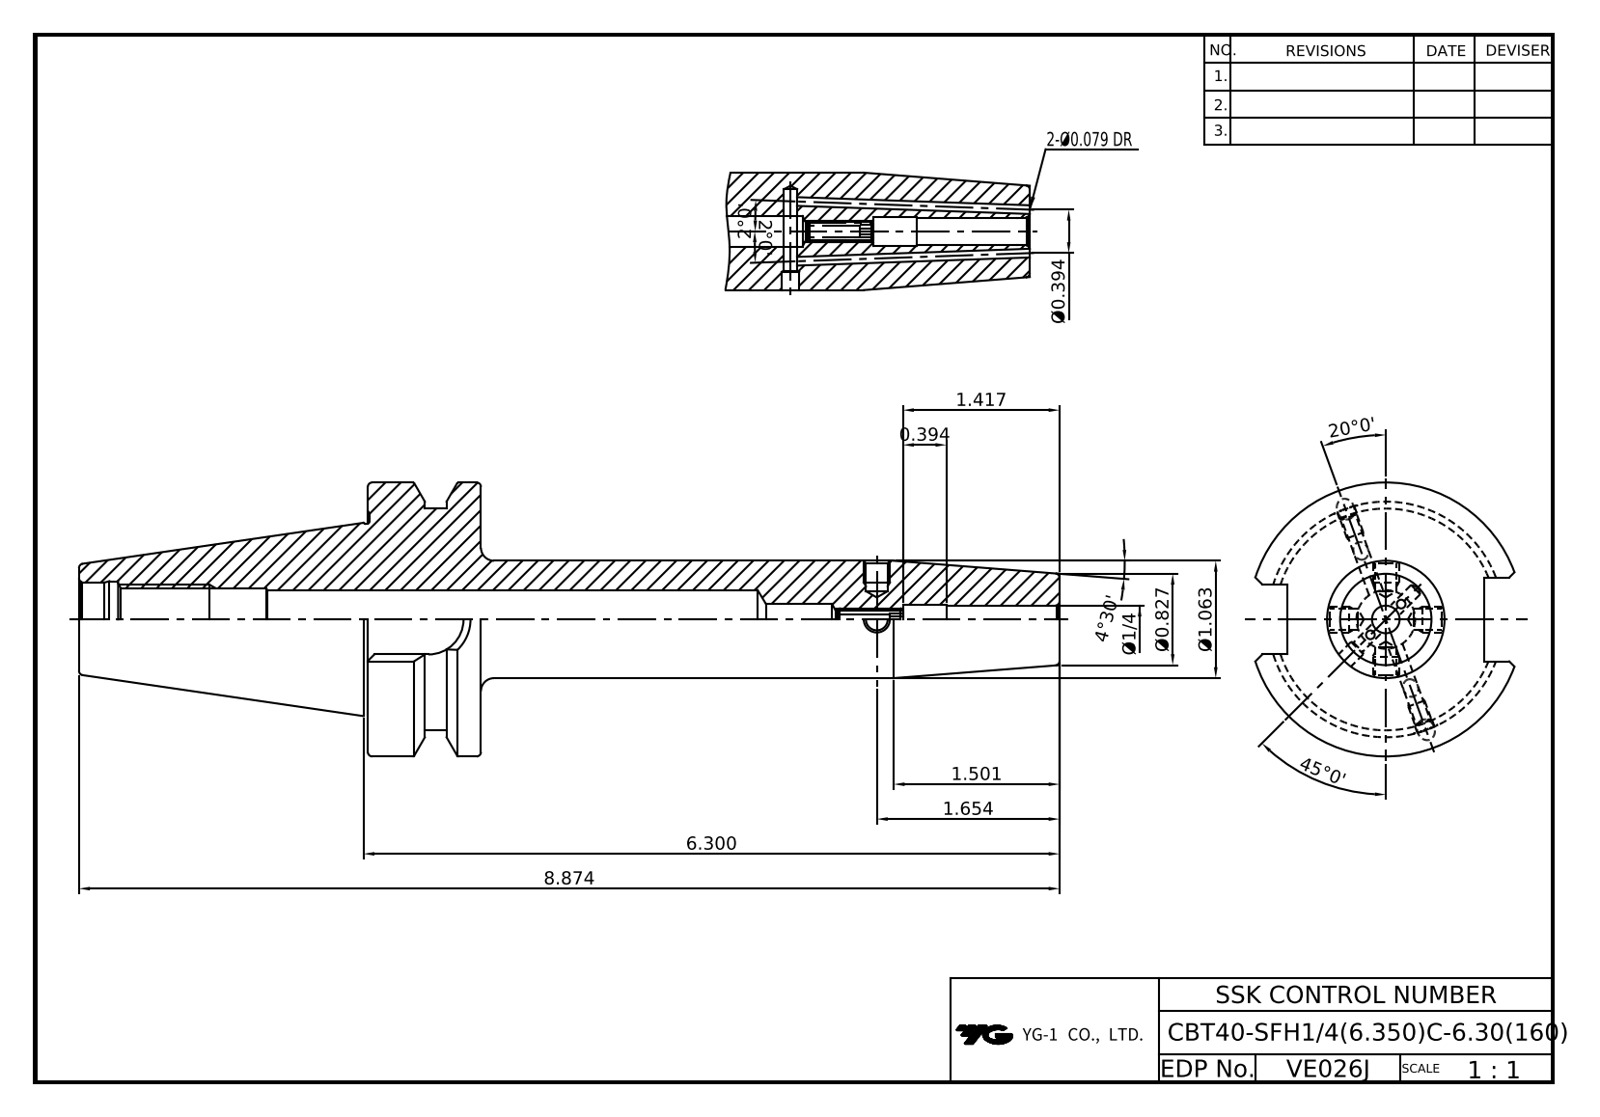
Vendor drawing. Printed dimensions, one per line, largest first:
45°0'
20°0'
8.874
6.300
4°30'
2°0'
2°0'
1.654
1.501
1.417
Ø1.063
Ø0.827
0.394
Ø0.394
